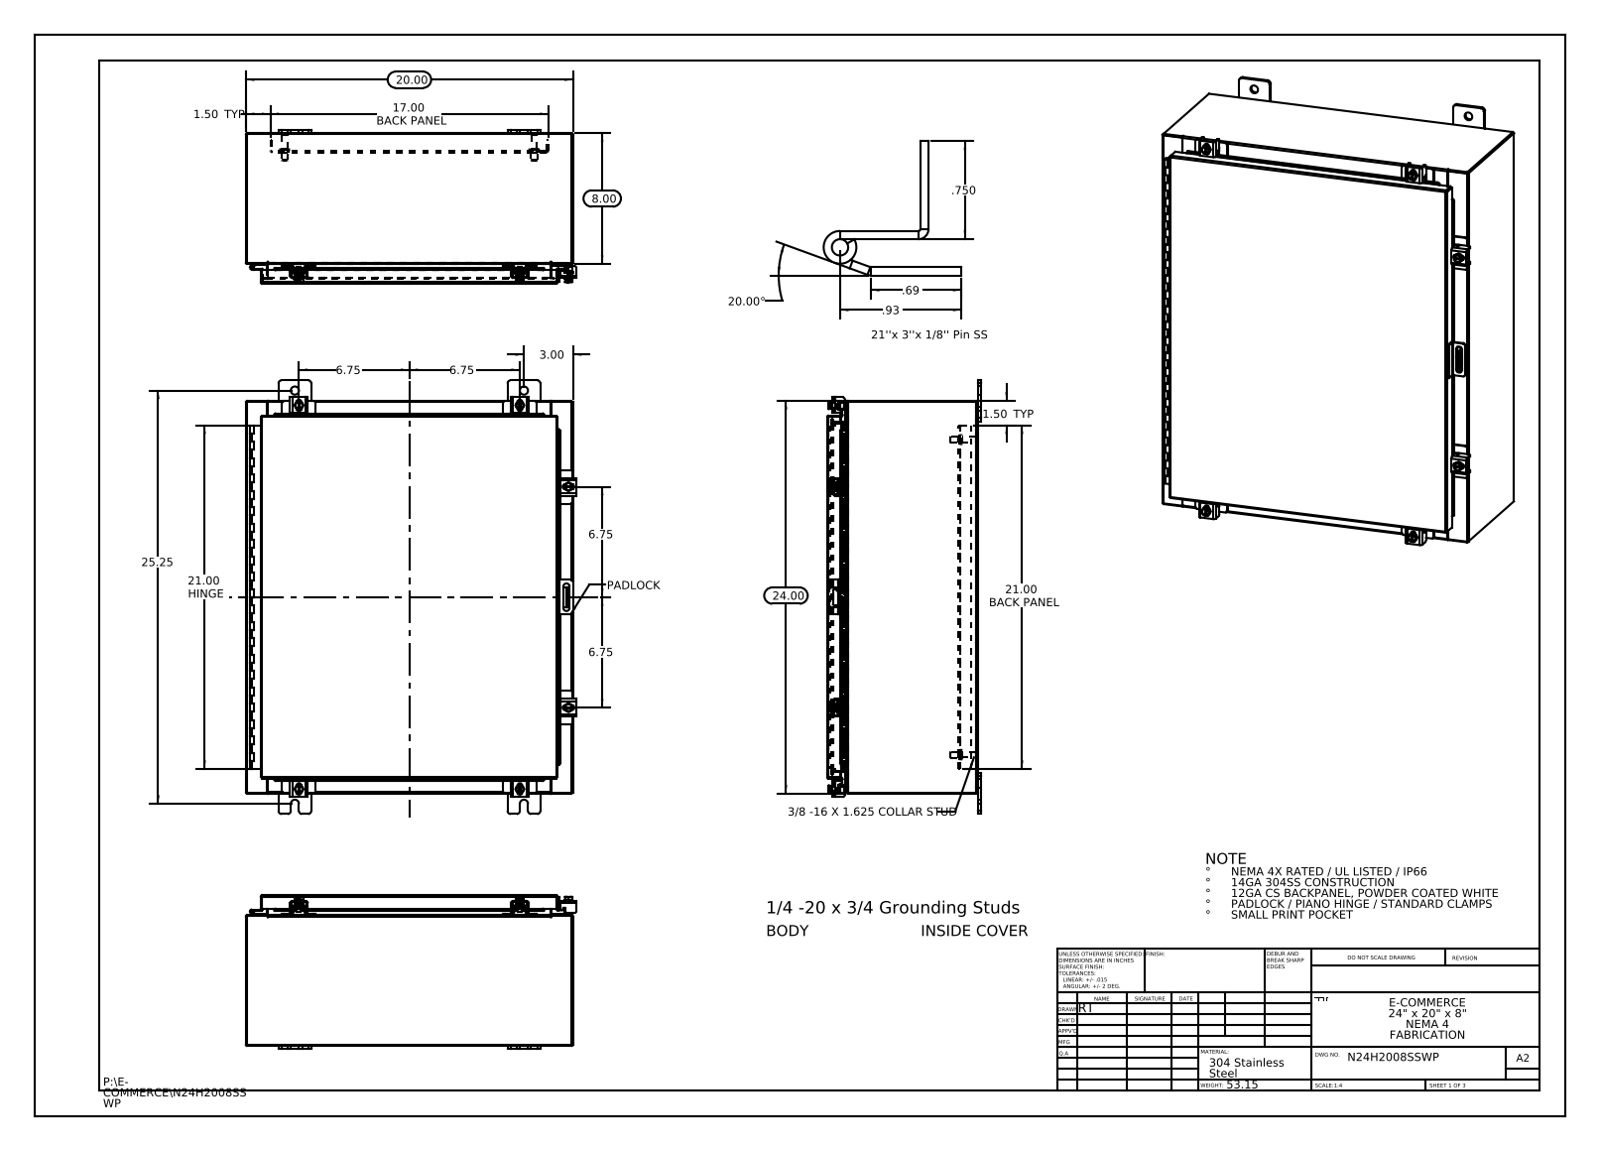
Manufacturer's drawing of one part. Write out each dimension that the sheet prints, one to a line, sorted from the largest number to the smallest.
25.25
24.00
21.00 HINGE
21.00 BACK PANEL
20.00
20.00°
17.00 BACK PANEL
8.00
6.75
6.75
6.75
6.75
3.00
1.50 TYP
1.50 TYP
.93
.750
.69
